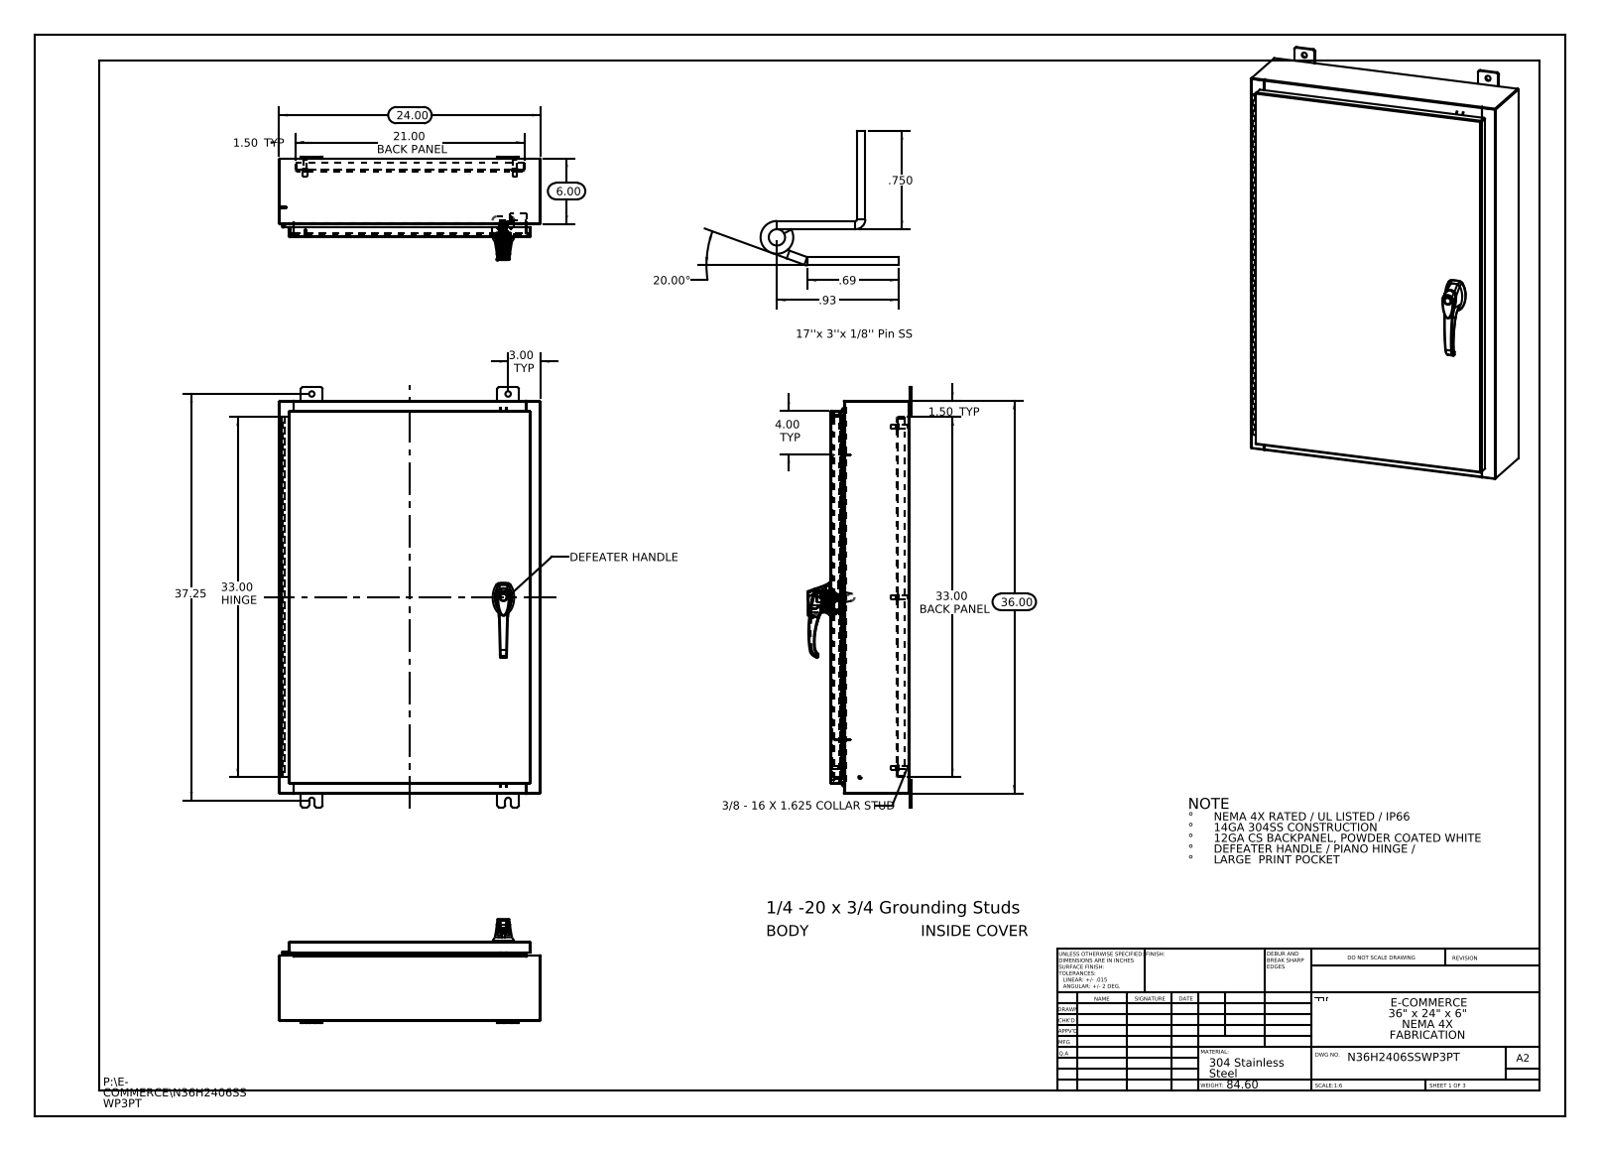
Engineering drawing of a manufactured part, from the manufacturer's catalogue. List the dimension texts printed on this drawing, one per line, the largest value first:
37.25
36.00
33.00 HINGE
33.00 BACK PANEL
24.00
21.00 BACK PANEL
20.00°
6.00
4.00 TYP
3.00 TYP
1.50 TYP
1.50 TYP
.93
.750
.69
